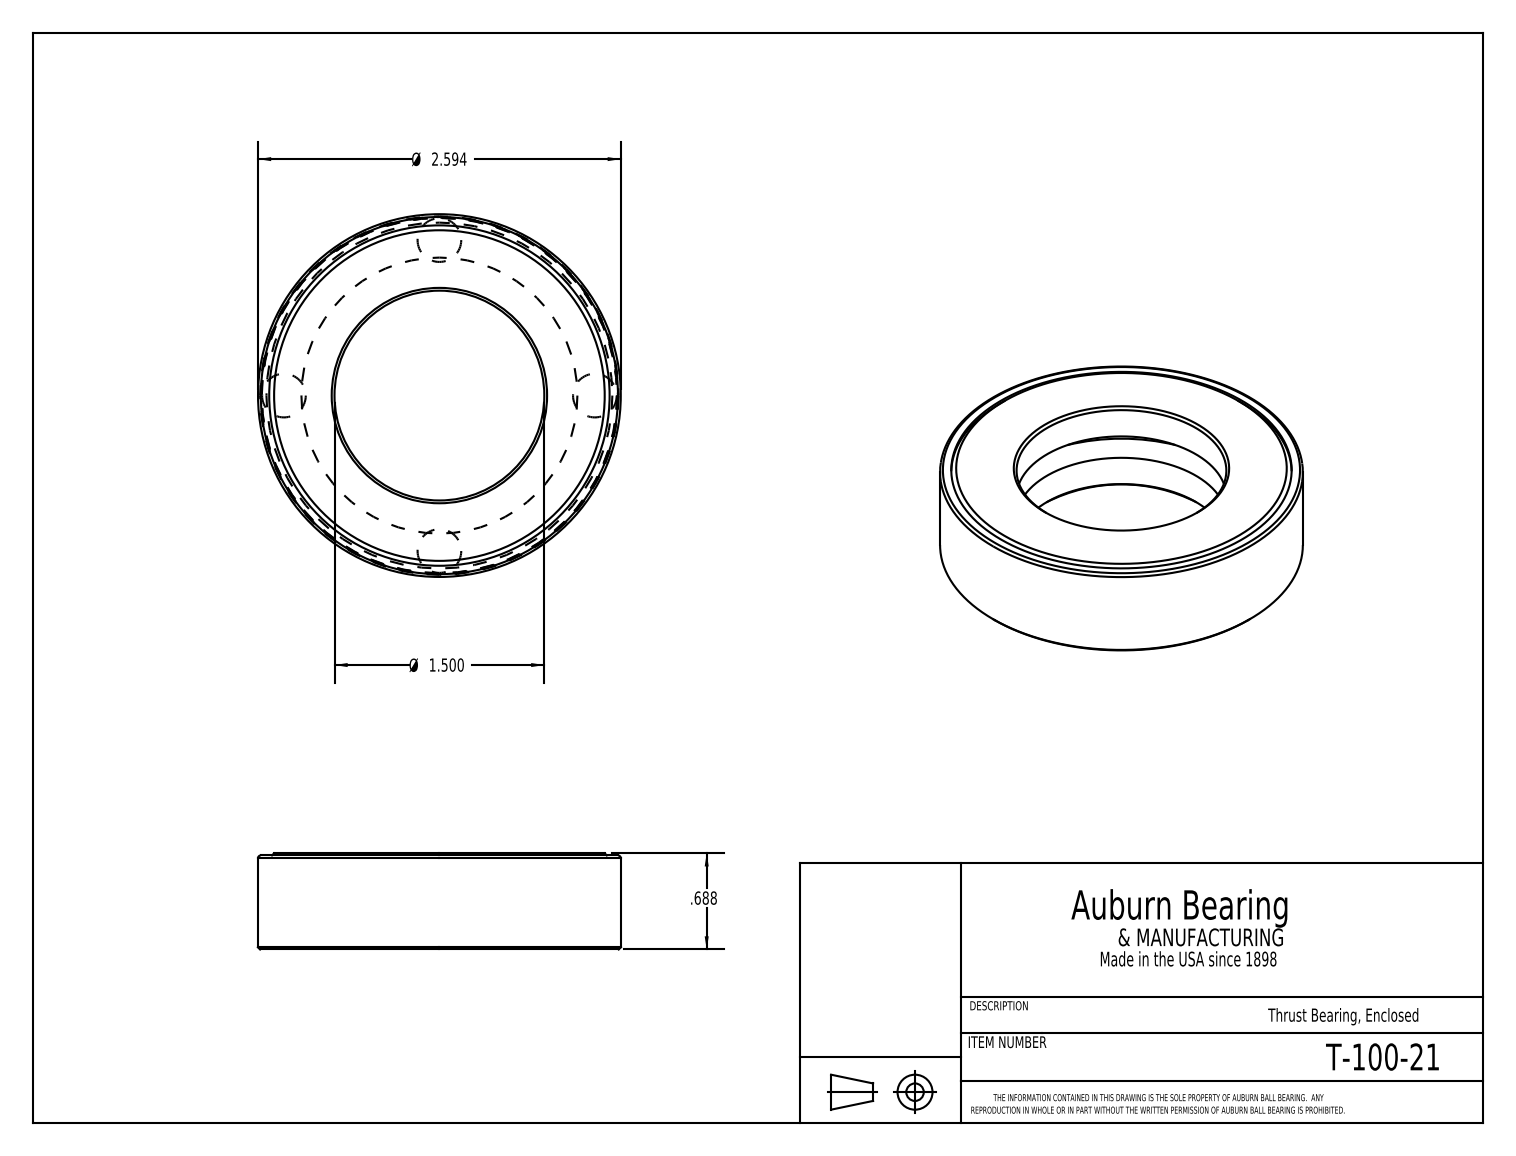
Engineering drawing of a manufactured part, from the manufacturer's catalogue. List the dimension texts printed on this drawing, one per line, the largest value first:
Ø 2.594
Ø 1.500
.688
